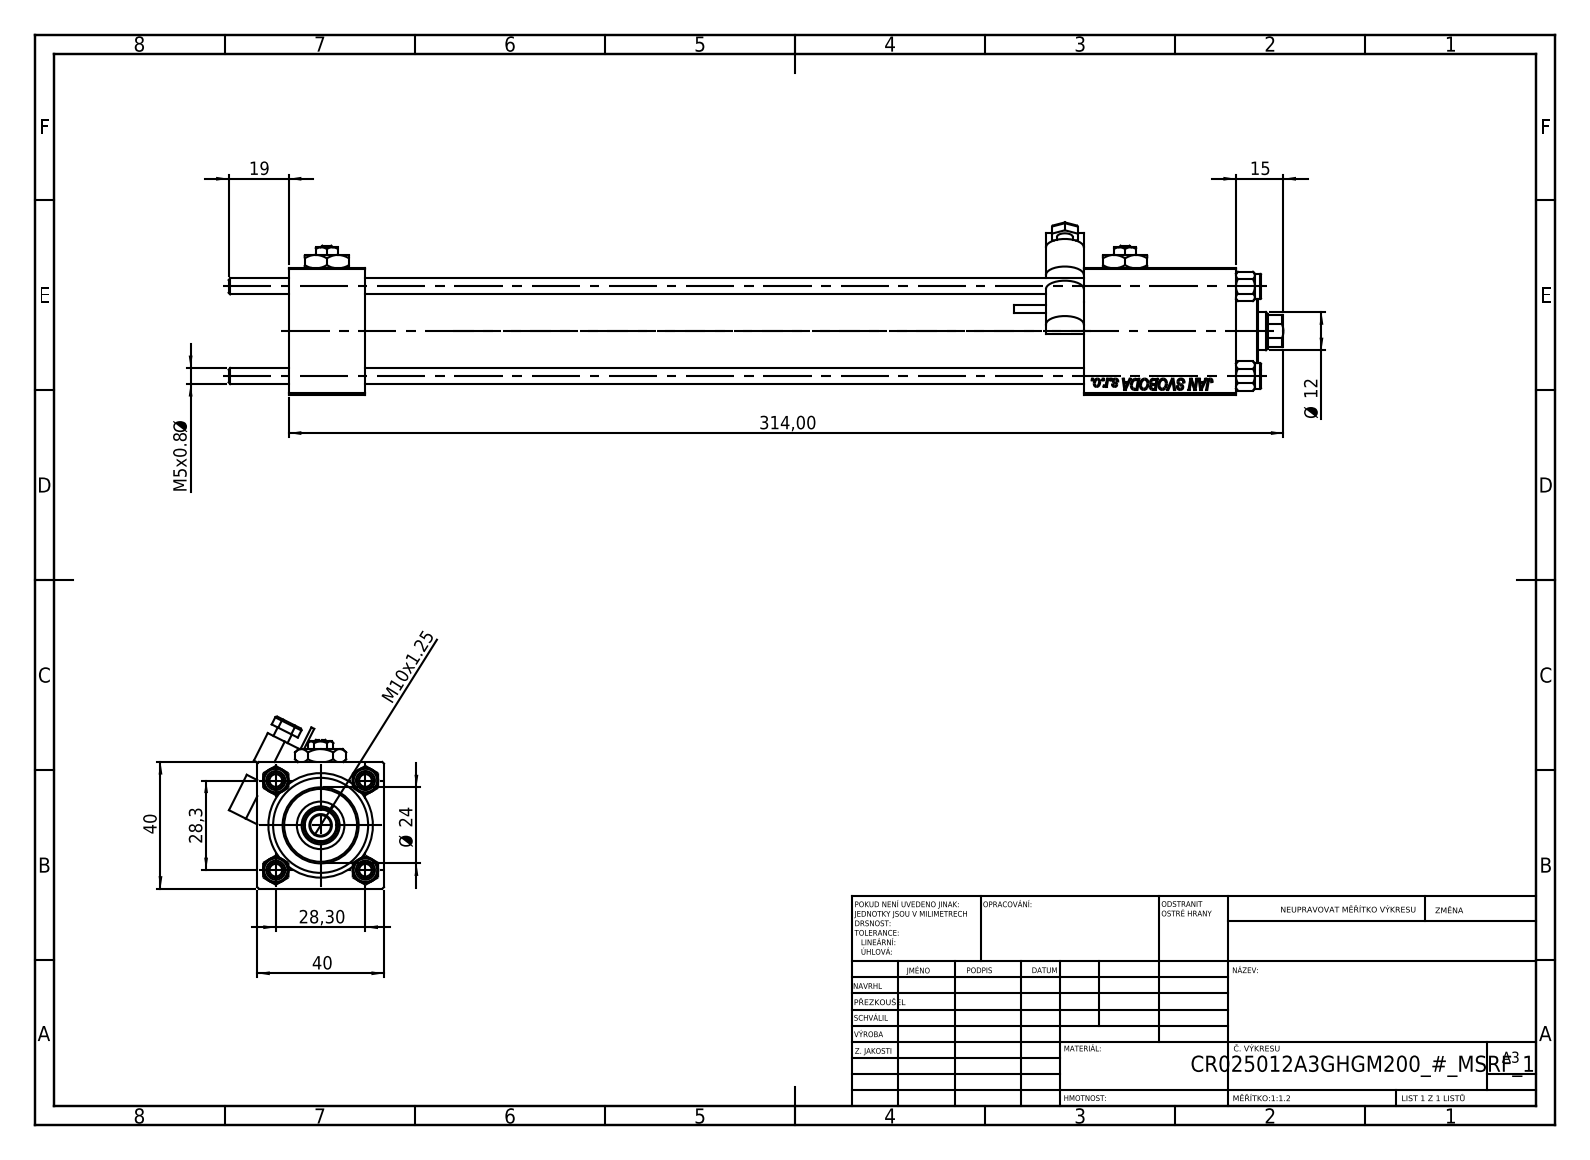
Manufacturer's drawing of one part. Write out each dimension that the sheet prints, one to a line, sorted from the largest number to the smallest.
314,00
40
40
28,3
28,30
Ø 24
19
15
Ø 12
M10x1.25
M5x0.8 Ø
